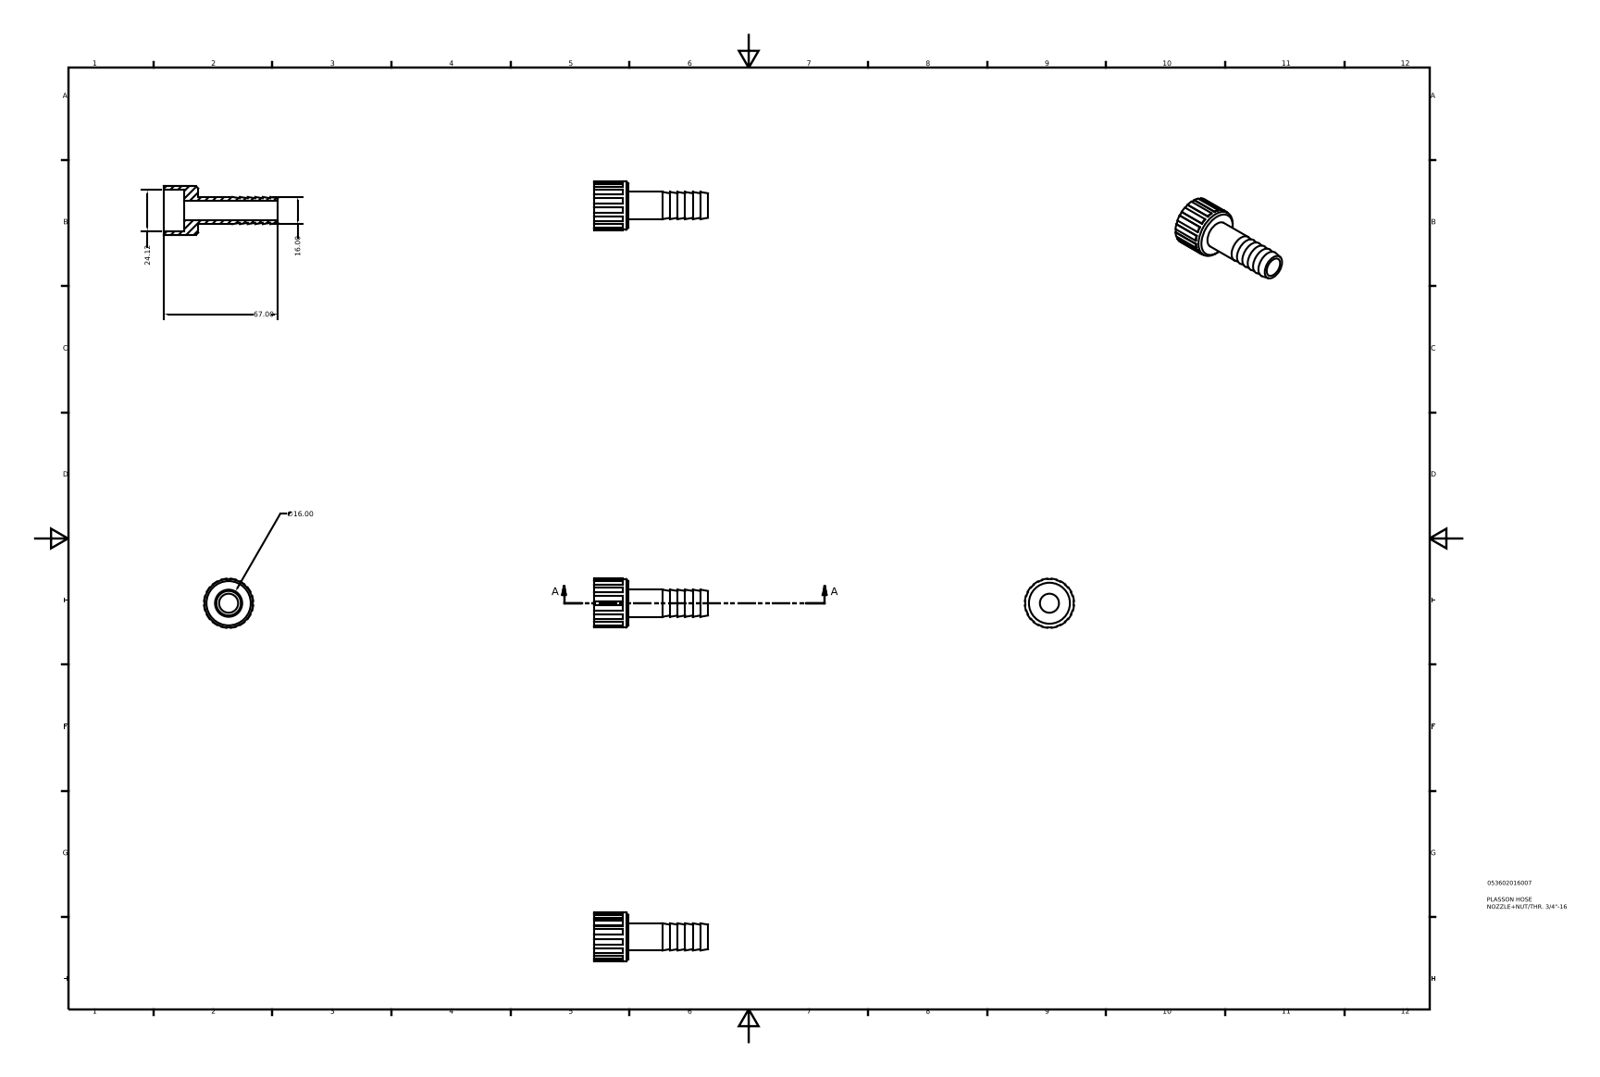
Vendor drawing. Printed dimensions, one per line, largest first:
67.00
24.12
16.00
∅16.00
